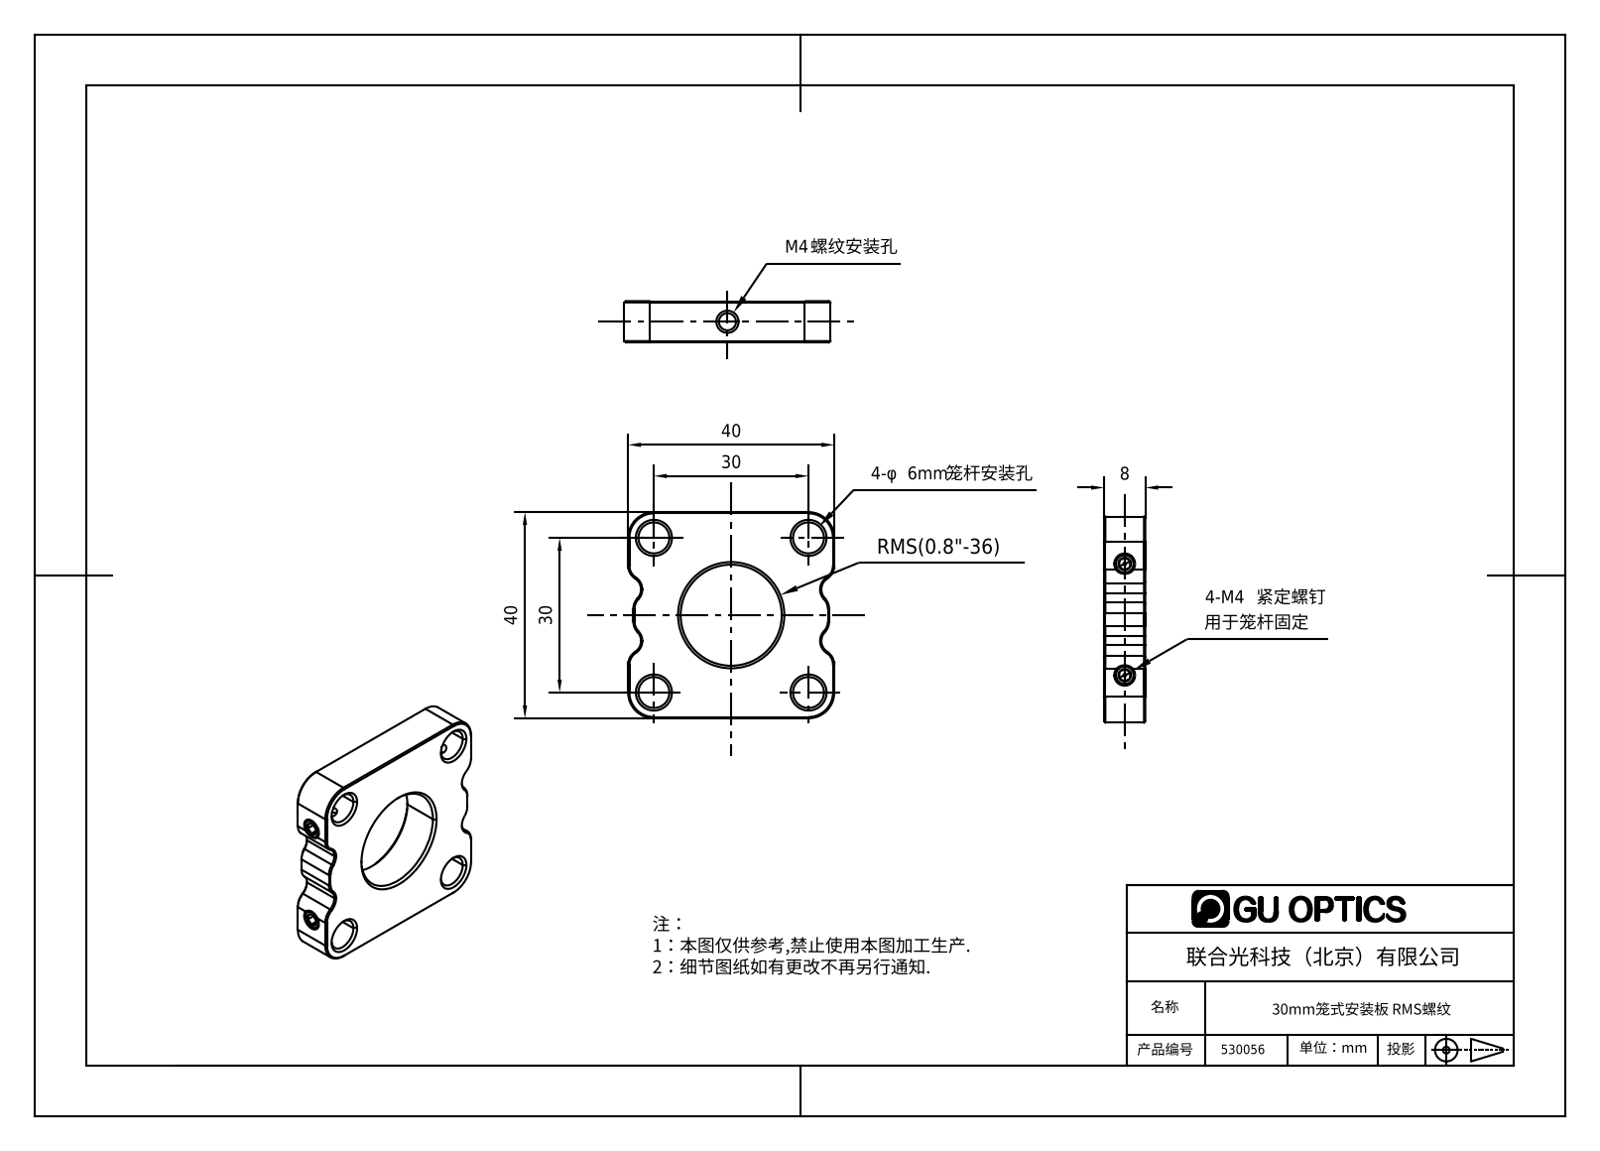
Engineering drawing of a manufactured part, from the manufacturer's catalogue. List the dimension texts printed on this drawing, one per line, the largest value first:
40
40
30
30
8
